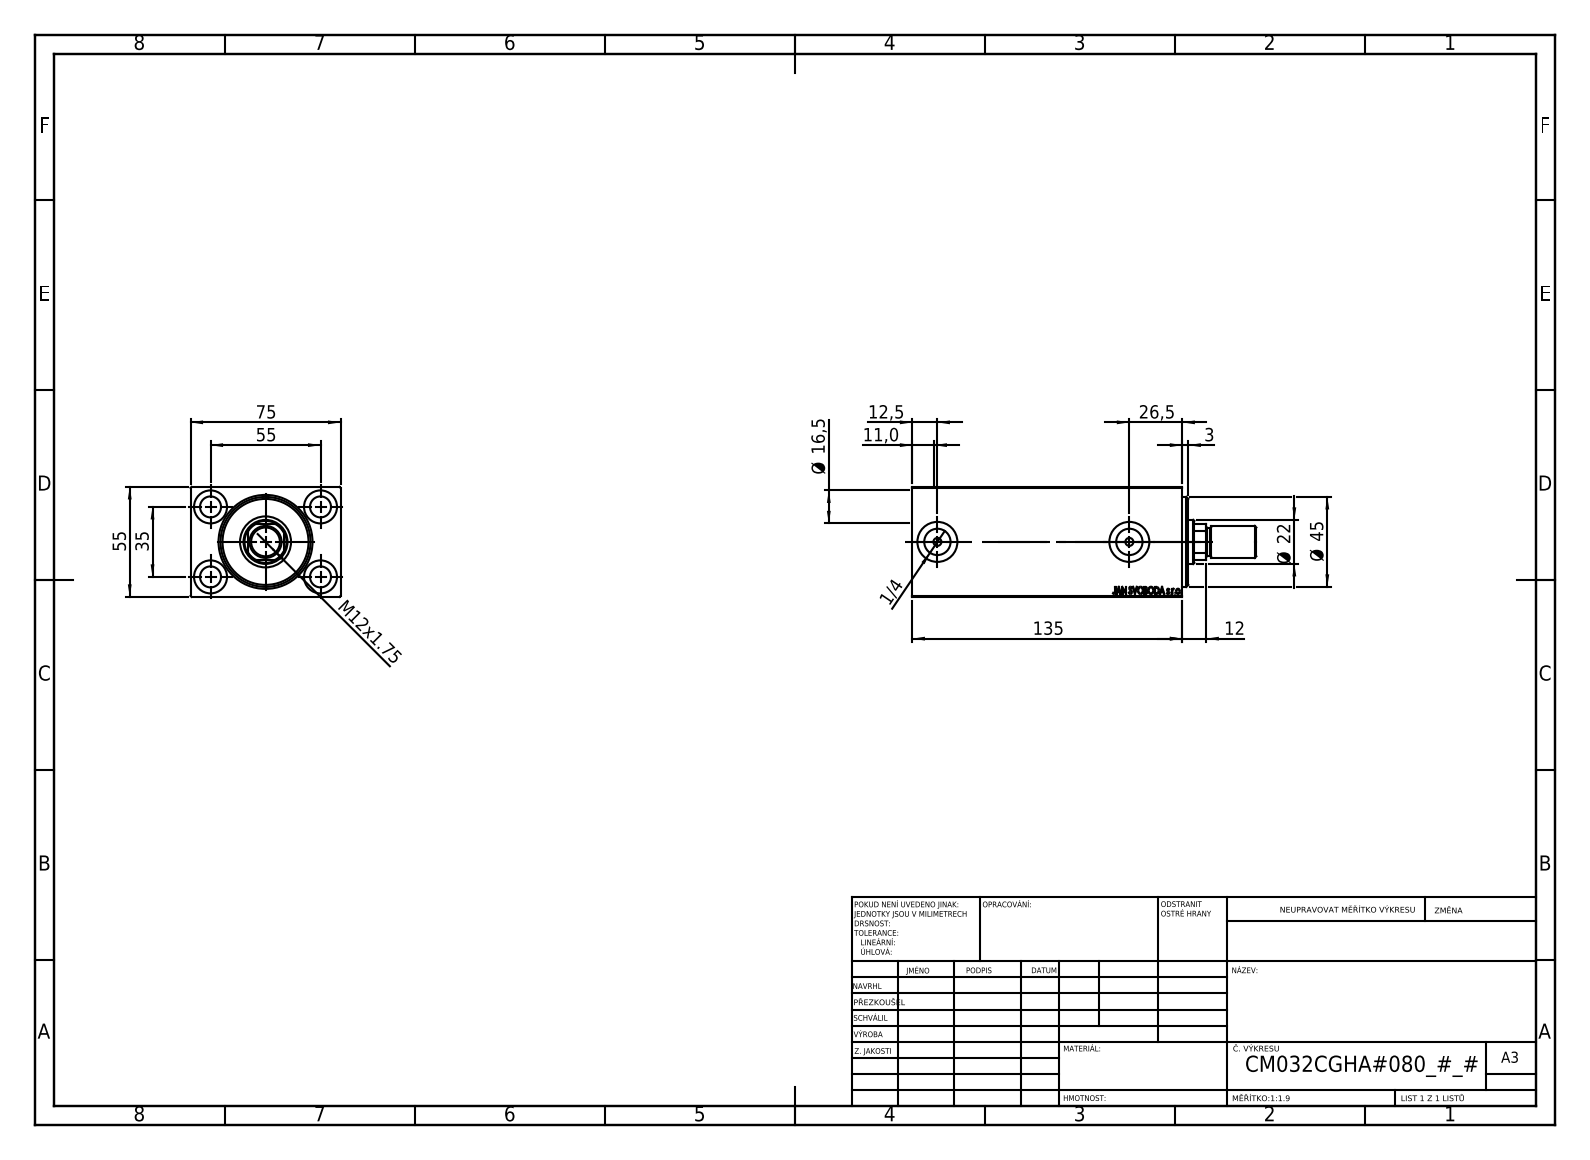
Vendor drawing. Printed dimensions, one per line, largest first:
135
75
55
55
Ø 45
35
26,5
Ø 22
Ø 16,5
12,5
M12x1.75
12
11,0
3
1/4
